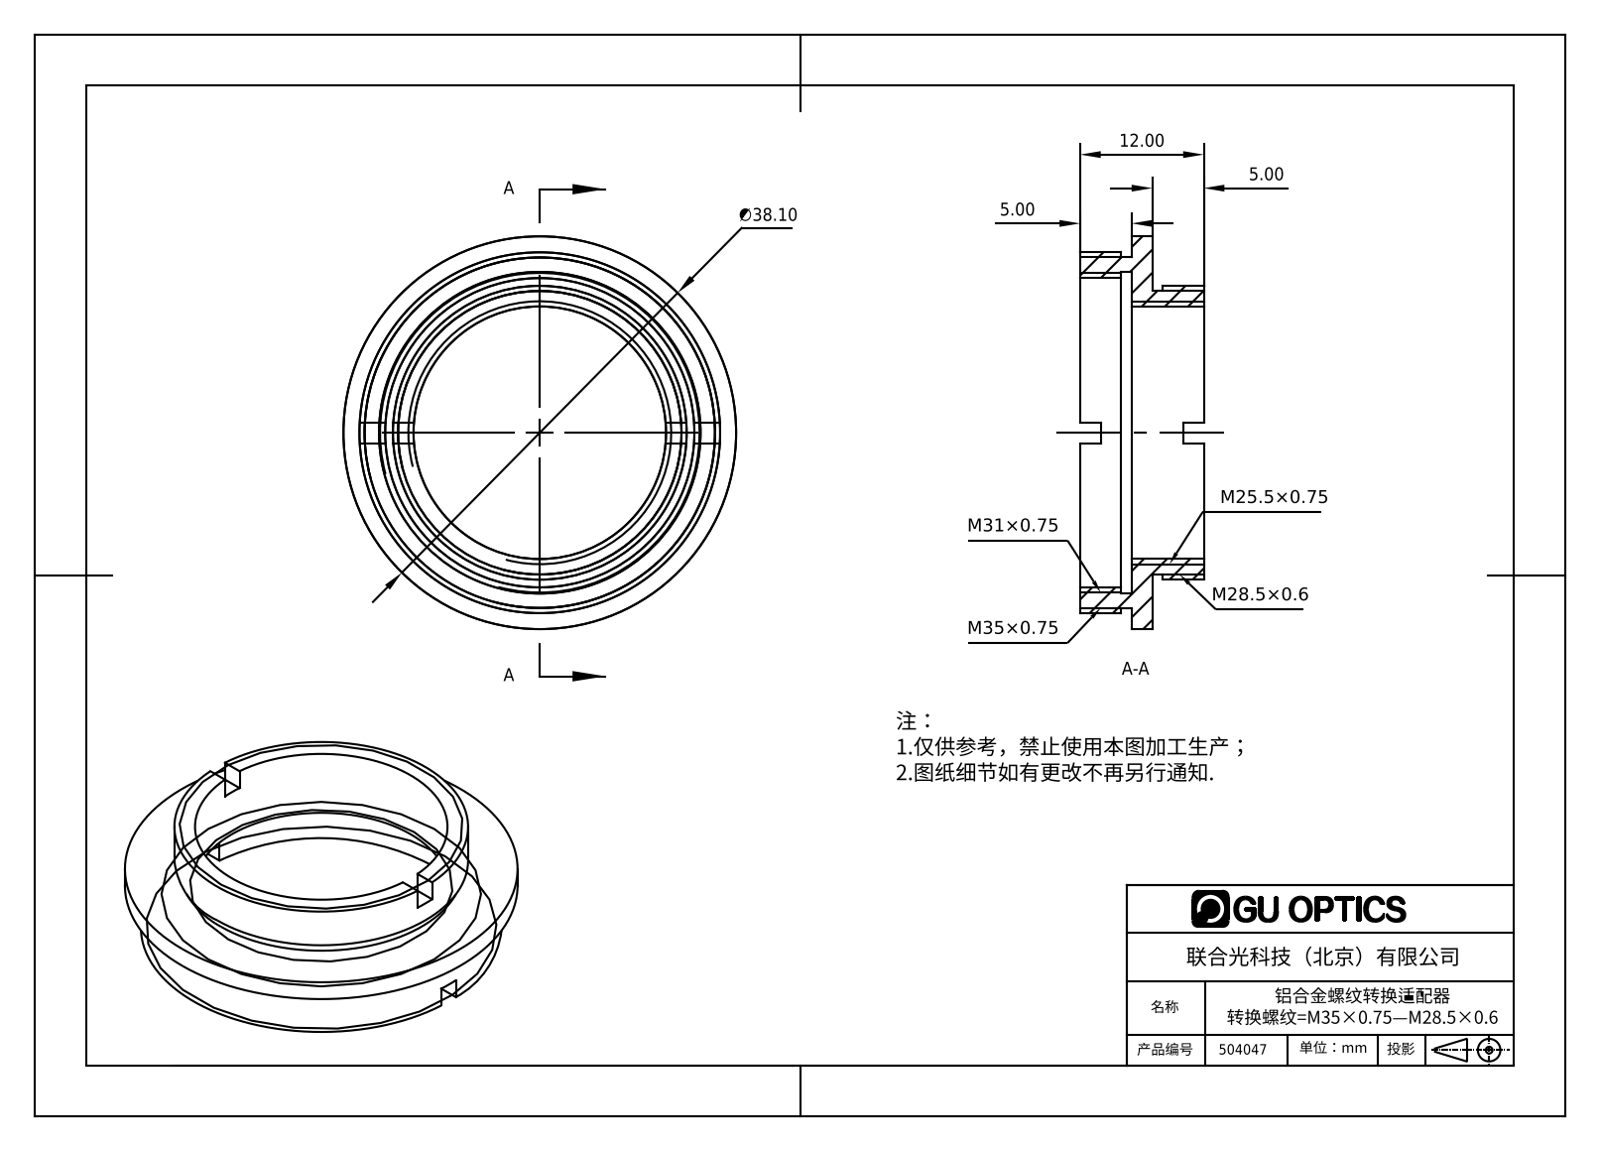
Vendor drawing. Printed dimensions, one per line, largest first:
∅38.10
12.00
5.00
5.00
